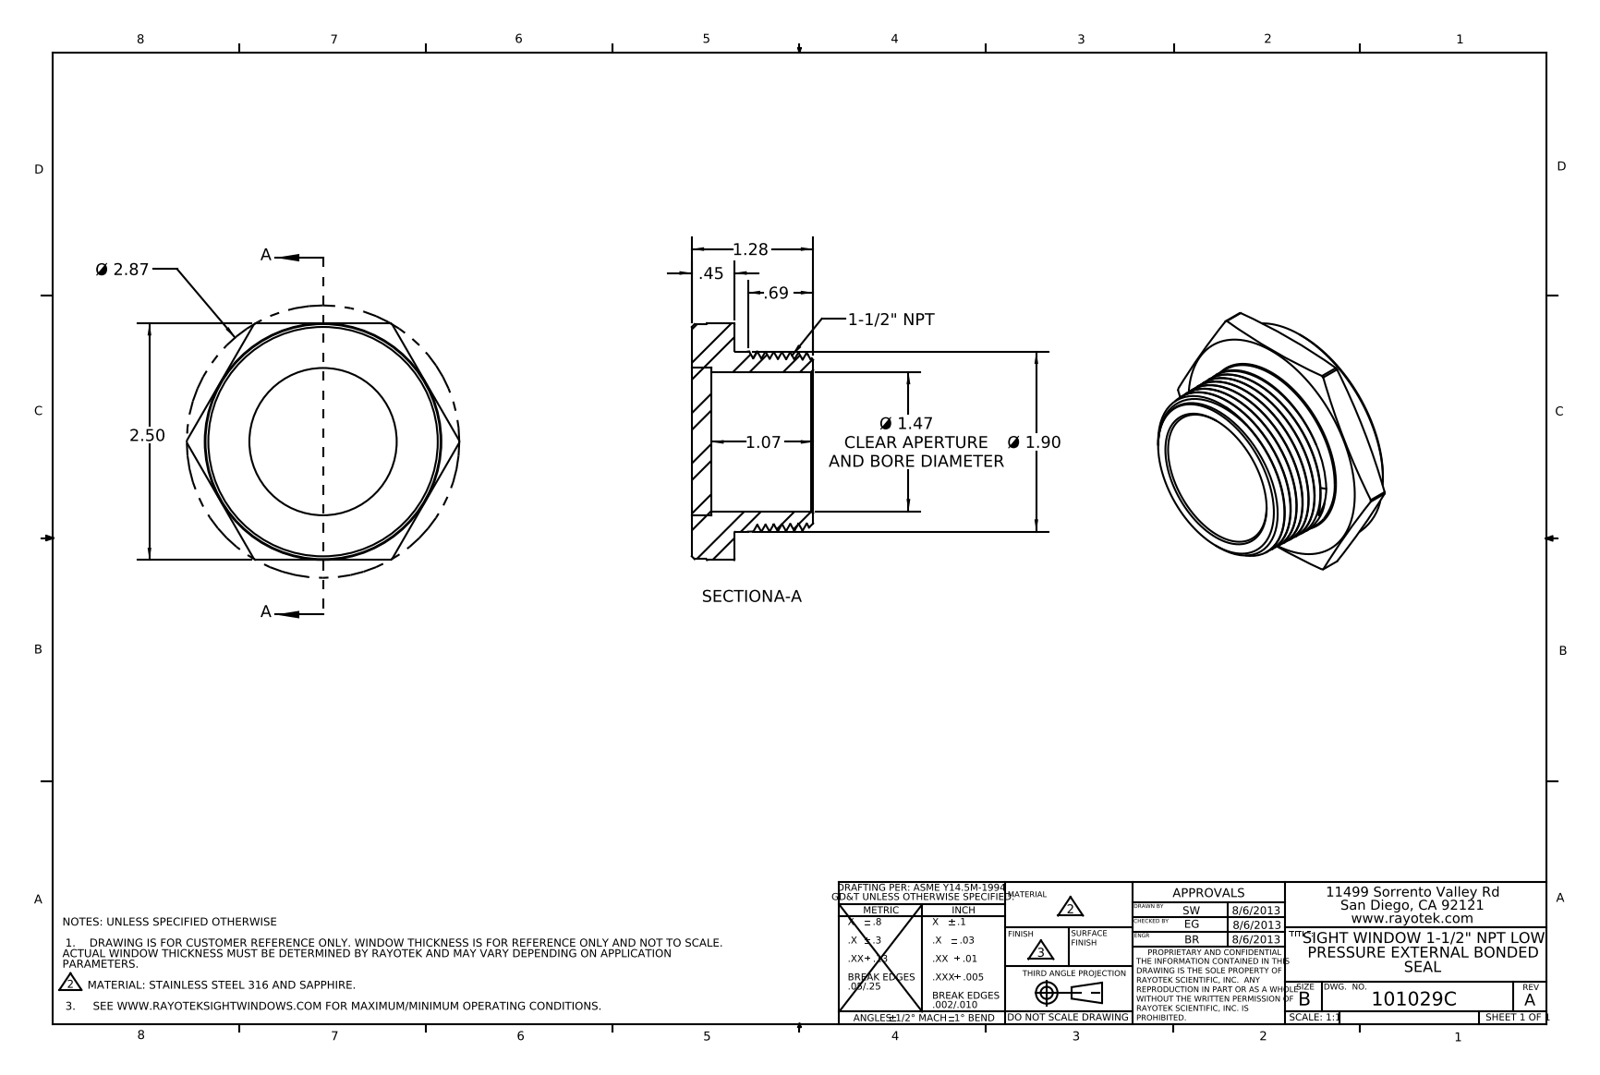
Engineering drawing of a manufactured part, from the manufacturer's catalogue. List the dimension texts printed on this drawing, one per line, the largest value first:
Ø 2.87
2.50
Ø 1.90
Ø 1.47 CLEAR APERTURE AND BORE DIAMETER
1.28
1.07
.69
.45
